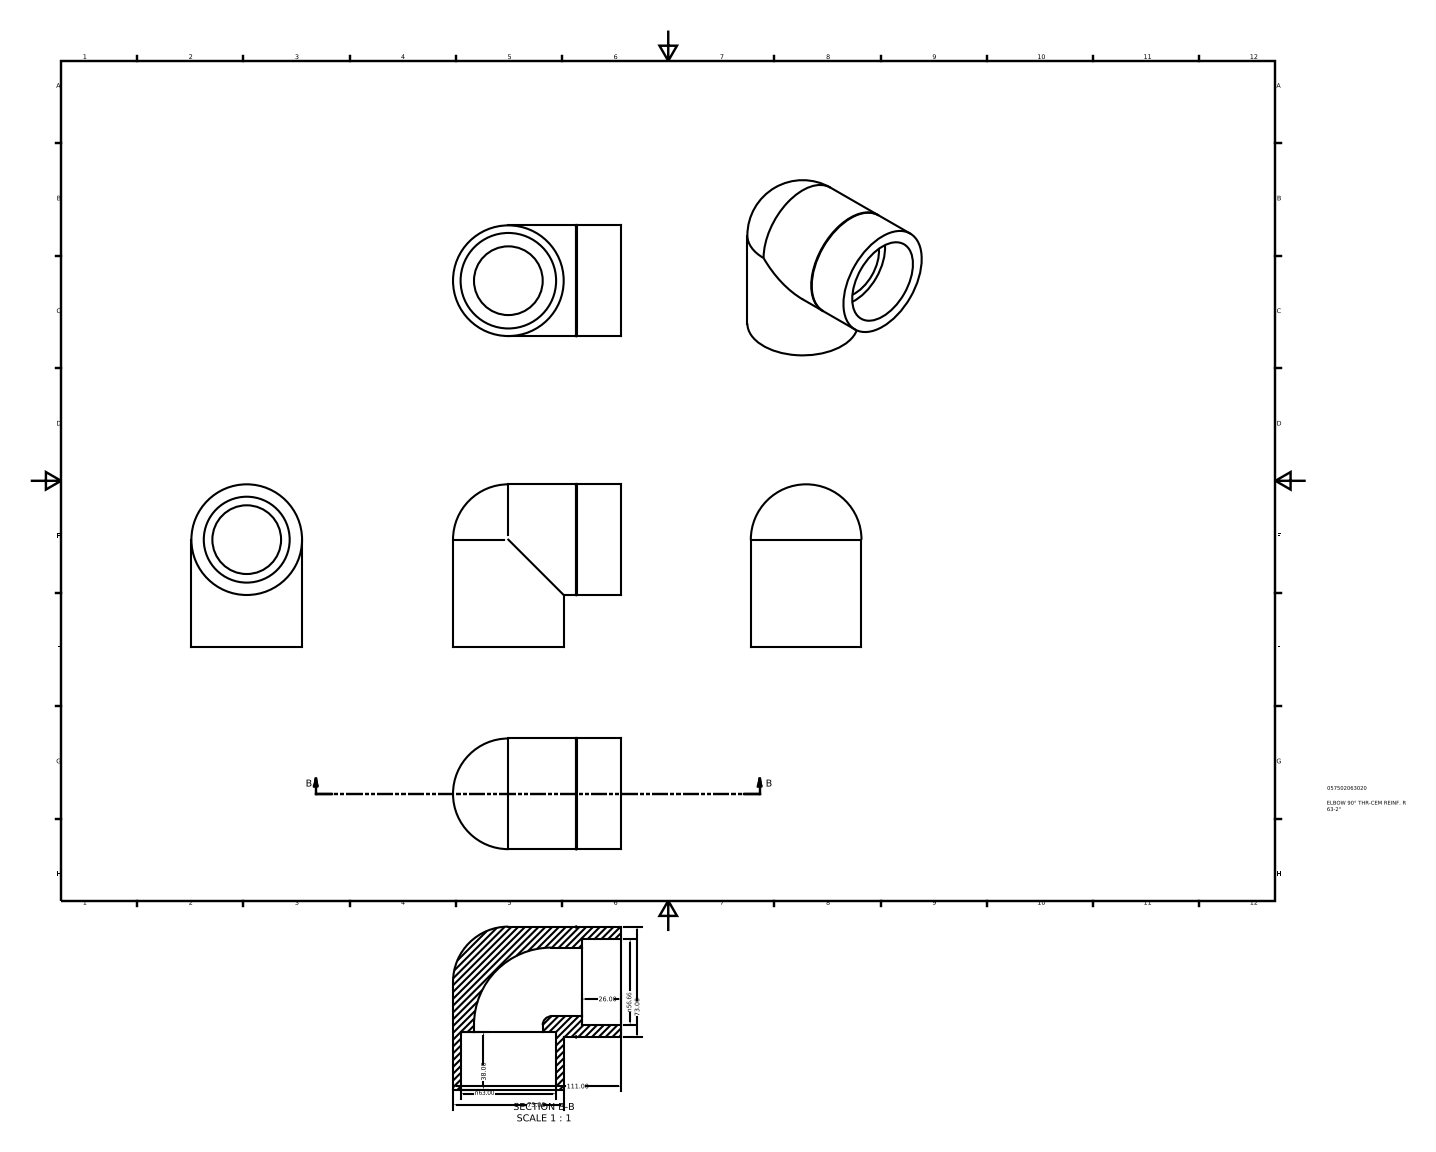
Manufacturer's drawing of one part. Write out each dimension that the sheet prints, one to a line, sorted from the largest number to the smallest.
111.00
73.00
73.00
n63.00
n56.66
38.00
26.00
